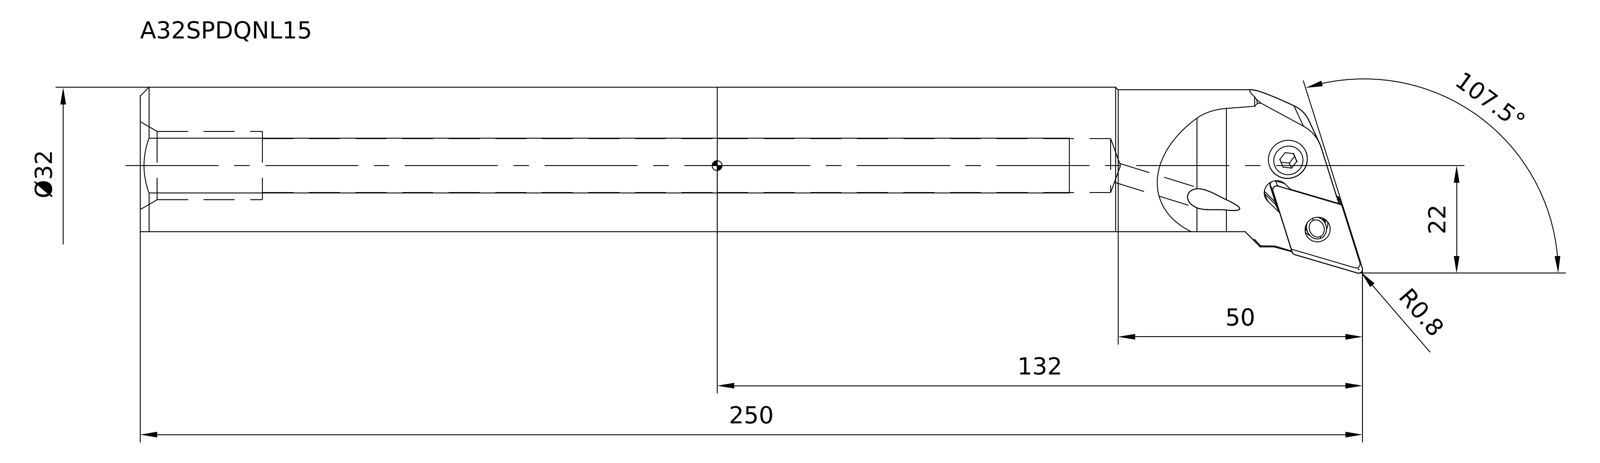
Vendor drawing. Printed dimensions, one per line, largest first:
250
132
107.5°
50
Ø32
22
R0.8
